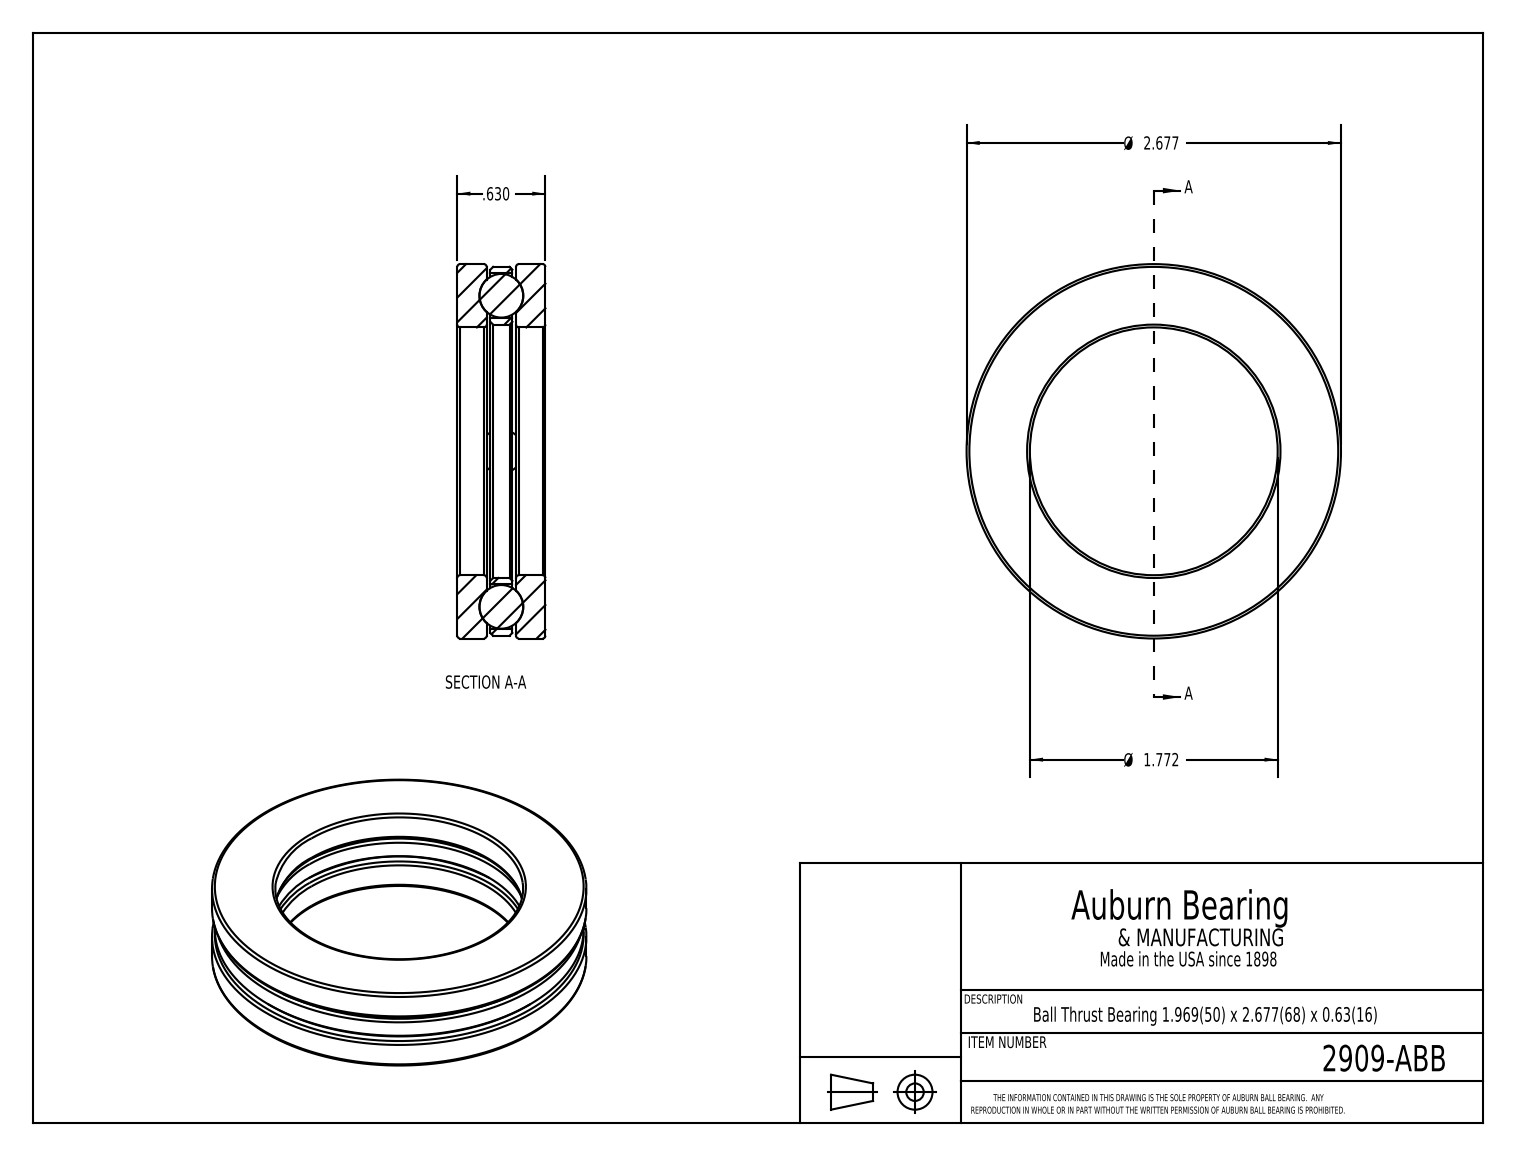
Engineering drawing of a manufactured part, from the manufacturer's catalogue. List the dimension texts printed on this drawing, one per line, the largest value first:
Ø 2.677
Ø 1.772
.630
